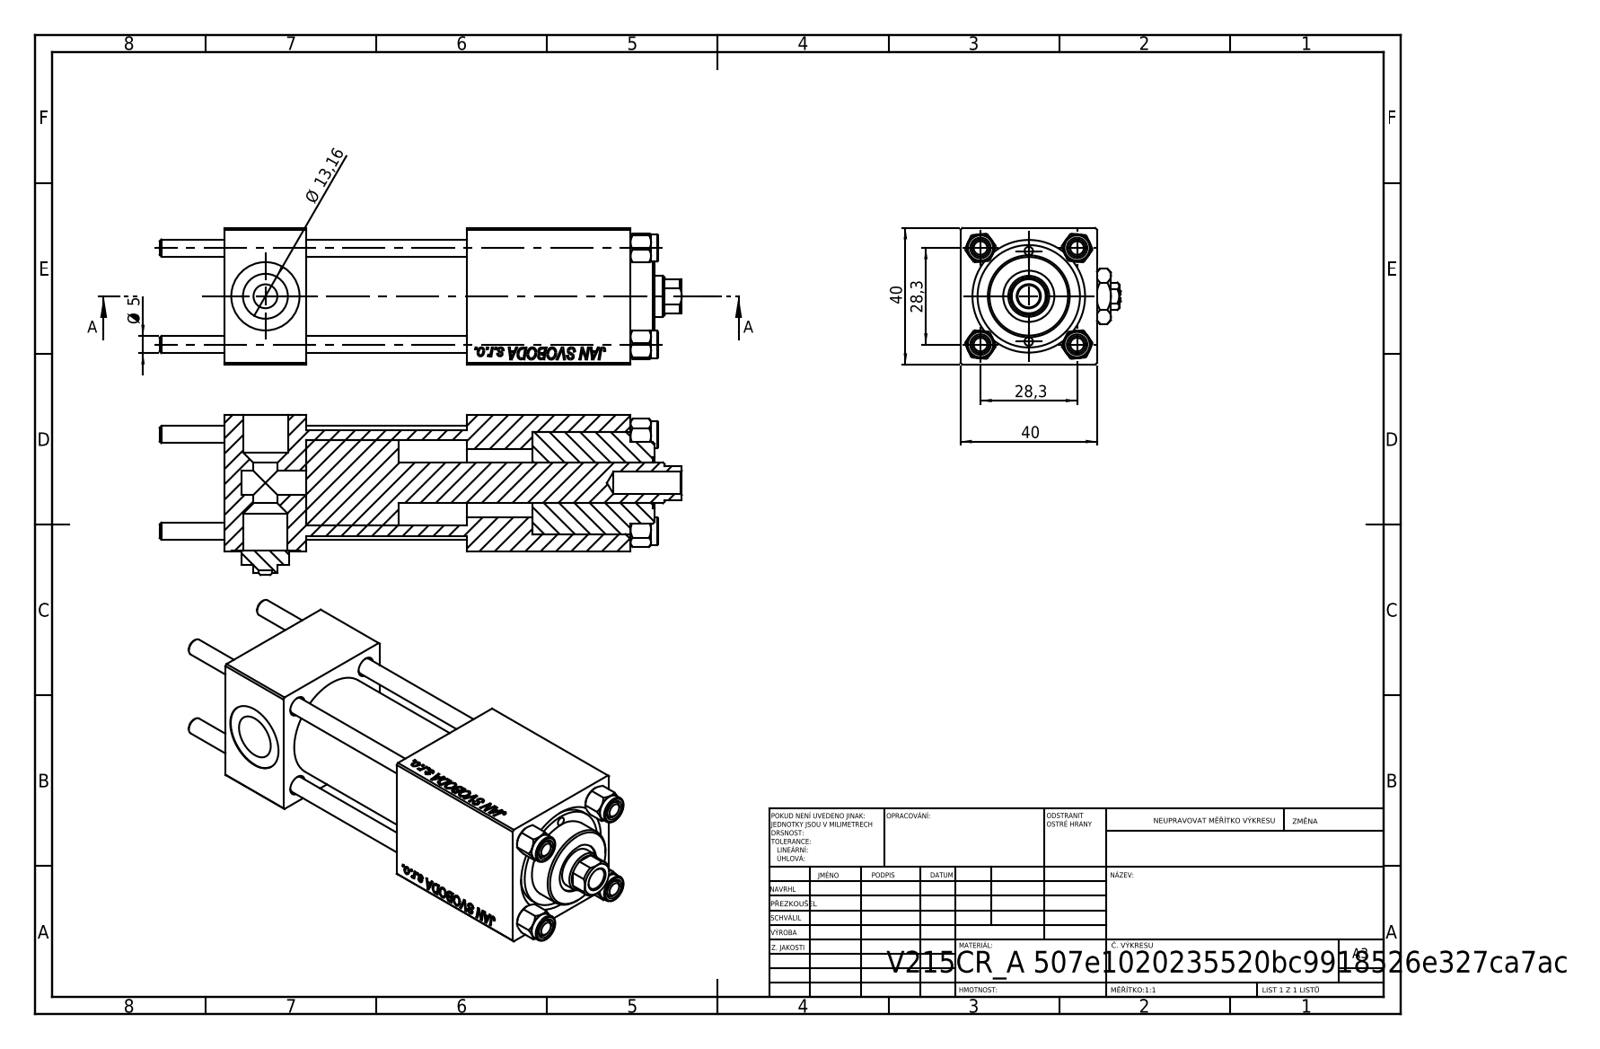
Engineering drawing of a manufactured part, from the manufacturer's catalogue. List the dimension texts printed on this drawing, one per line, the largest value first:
40
40
28,3
28,3
Ø 13,16
Ø 5
